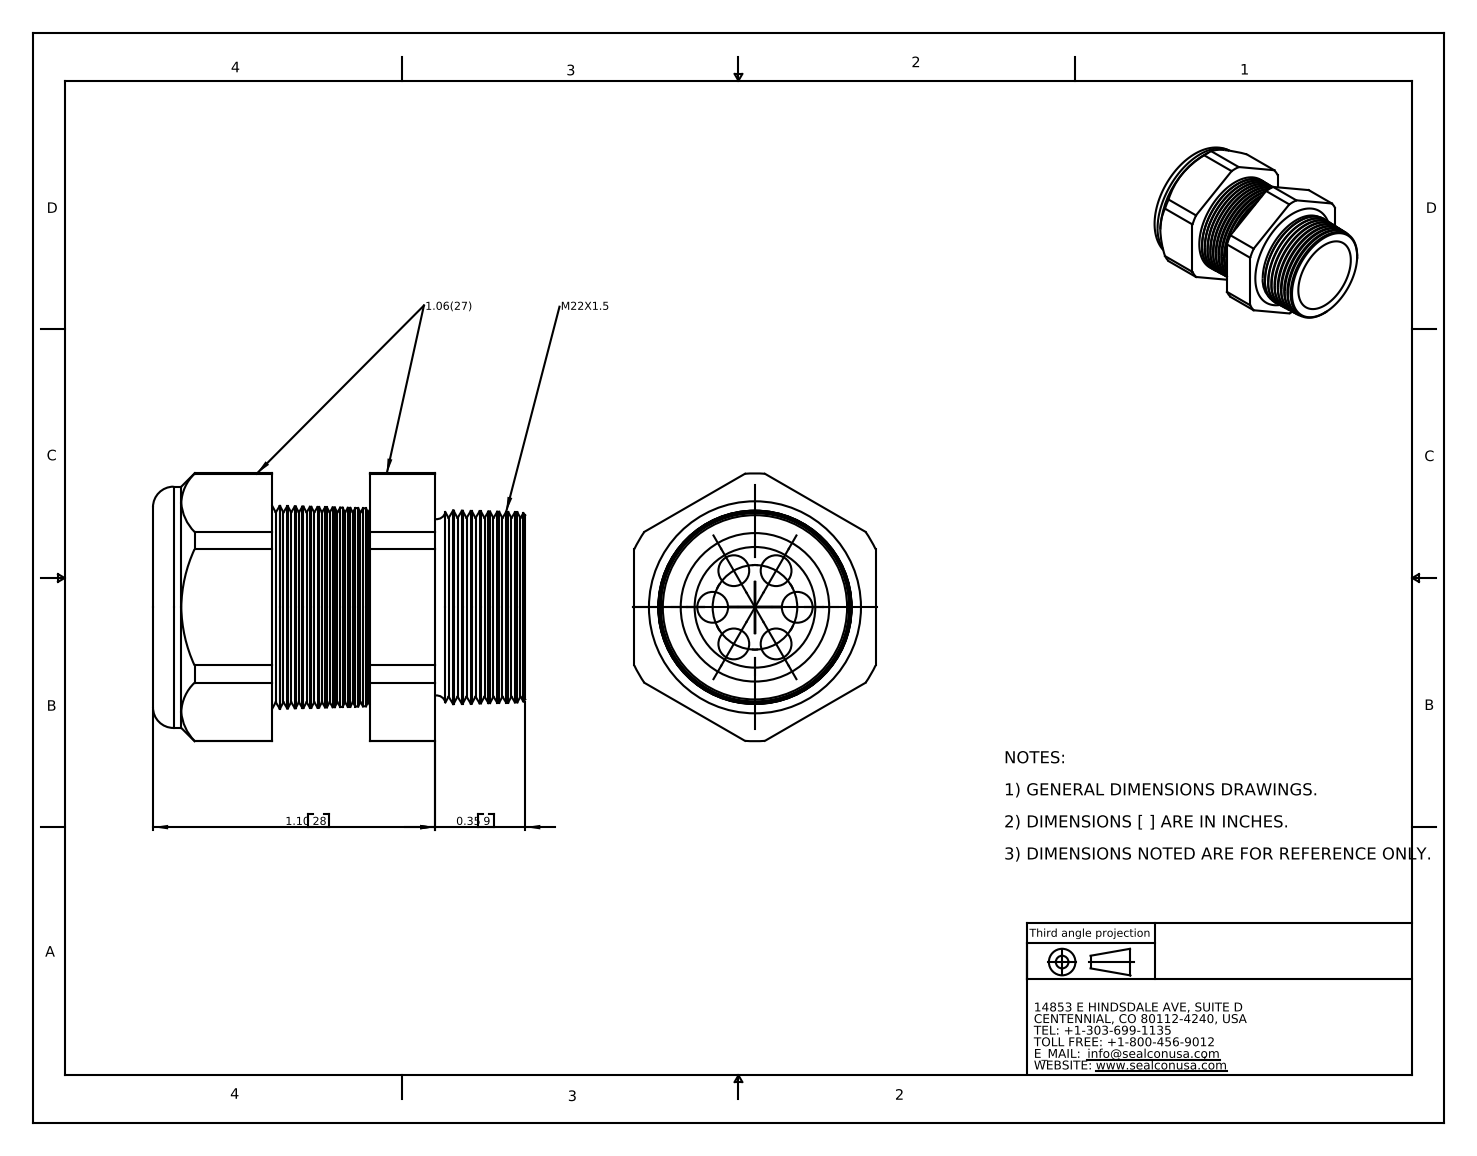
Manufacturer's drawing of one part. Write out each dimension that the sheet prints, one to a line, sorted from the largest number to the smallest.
1.10 28
0.35 9
